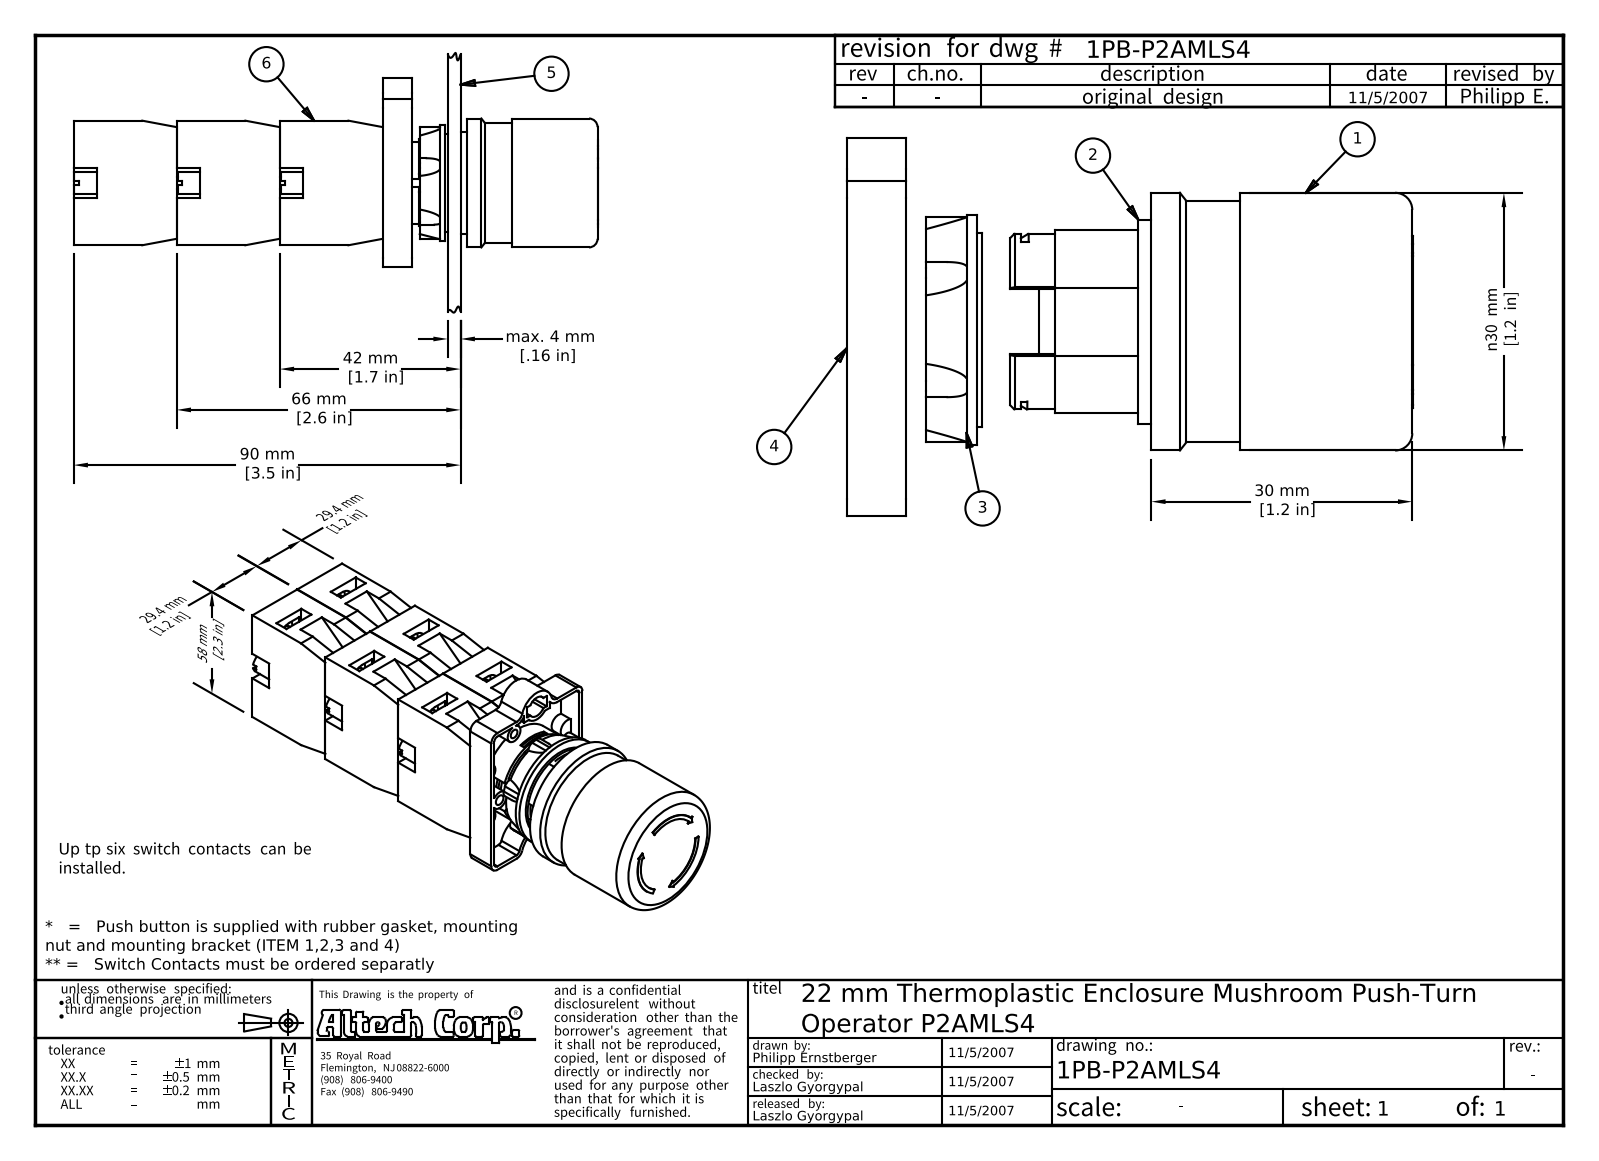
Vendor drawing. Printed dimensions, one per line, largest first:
90 mm [3.5 in]
66 mm [2.6 in]
58 mm [2.3 in]
42 mm [1.7 in]
n30 mm [1.2 in]
30 mm [1.2 in]
29.4 mm [1.2 in]
29.4 mm [1.2 in]
max. 4 mm [.16 in]
